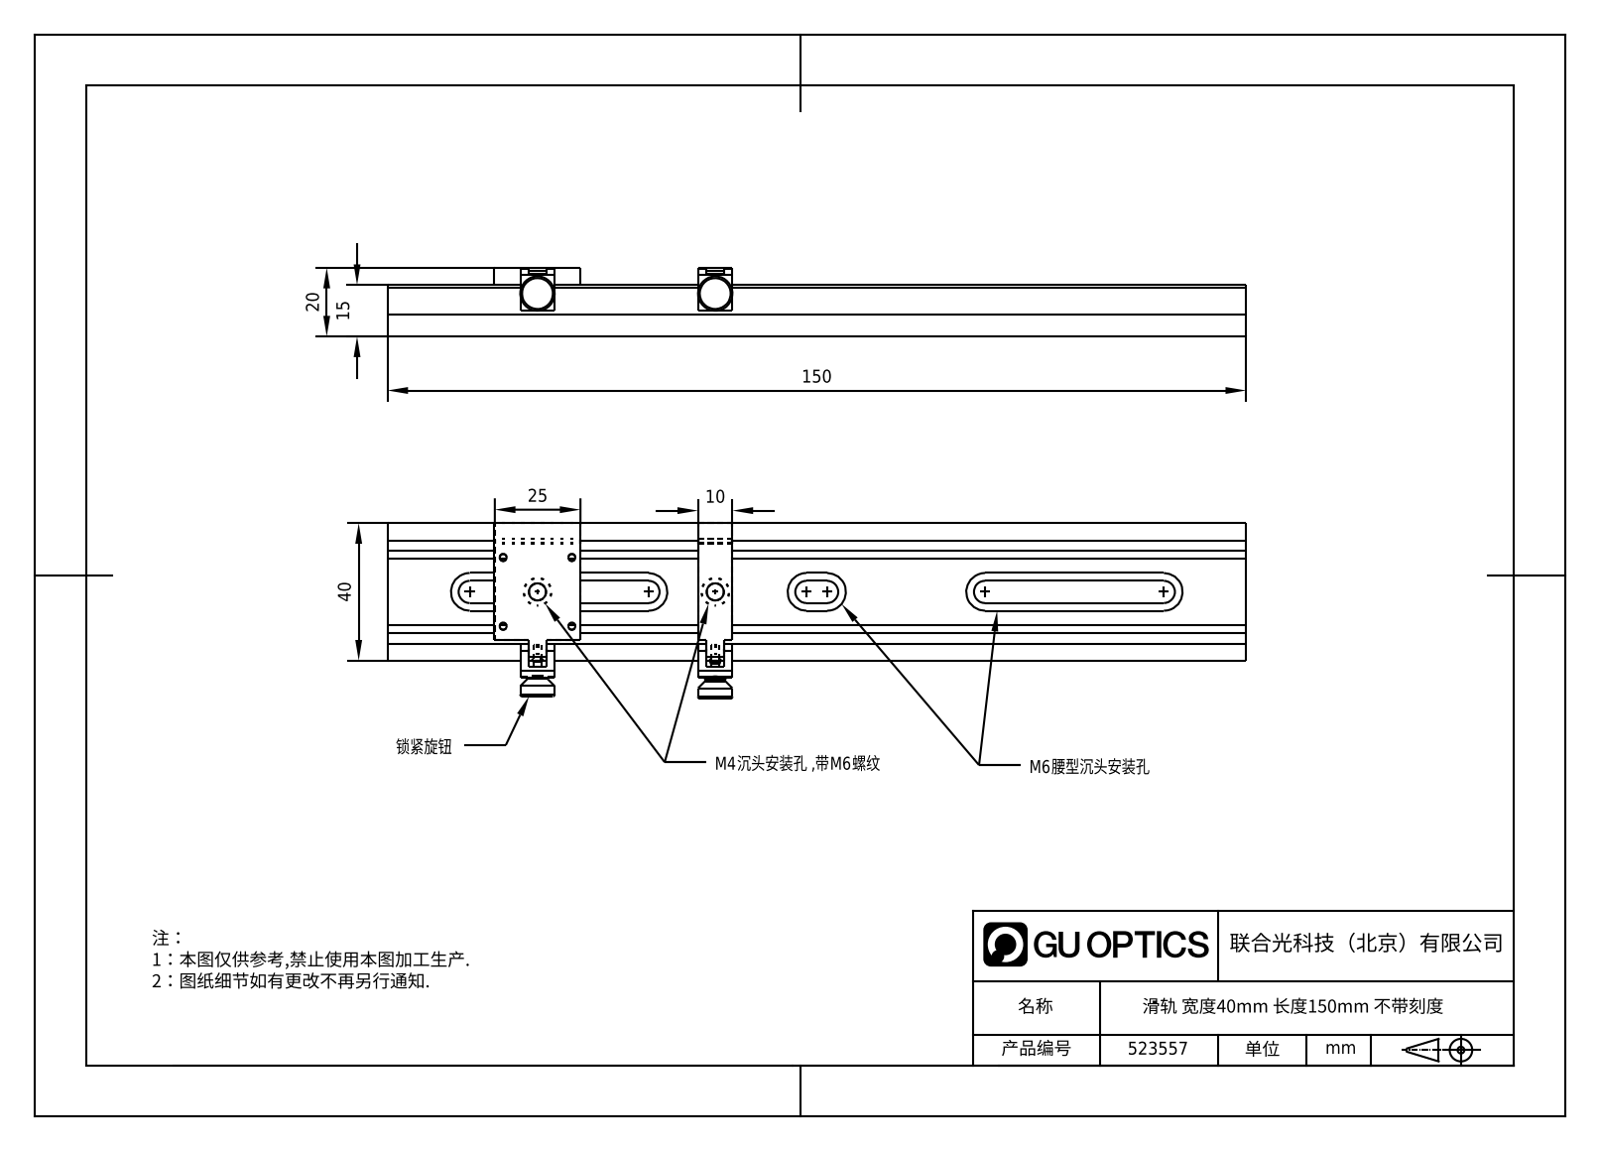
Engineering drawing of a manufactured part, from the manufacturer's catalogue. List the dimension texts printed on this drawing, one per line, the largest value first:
150
40
25
20
15
10
